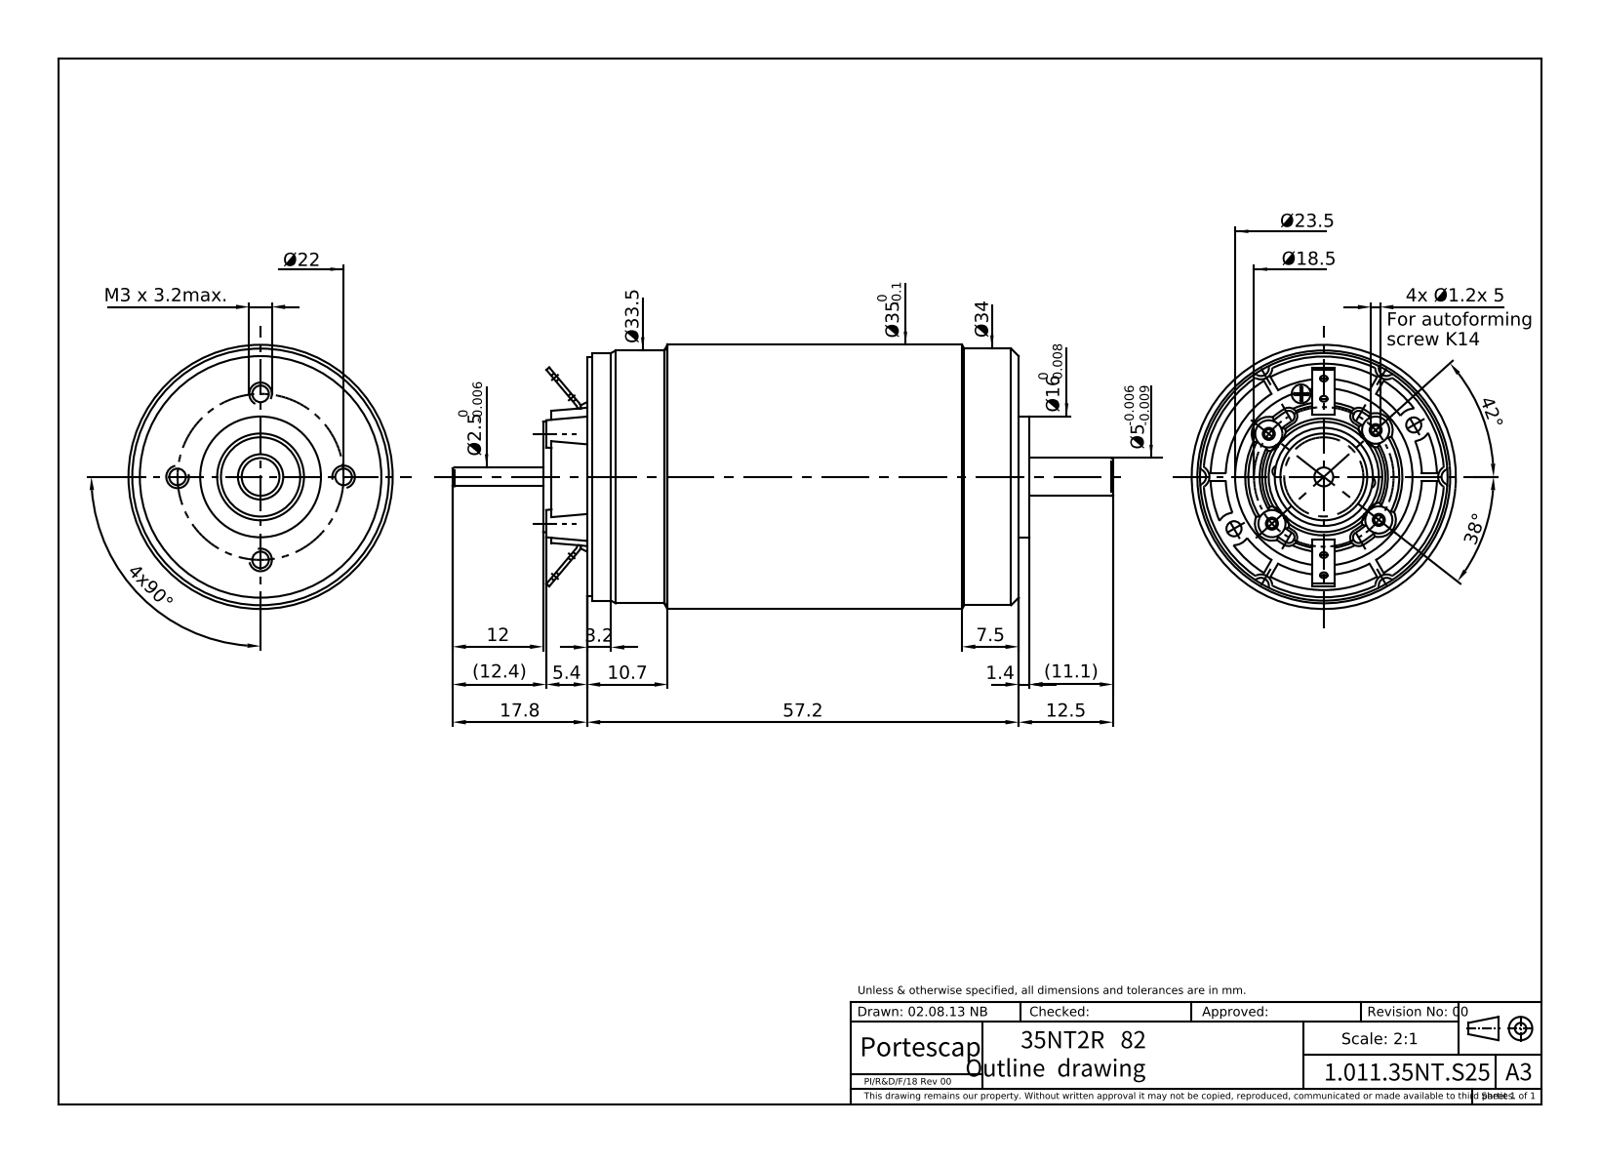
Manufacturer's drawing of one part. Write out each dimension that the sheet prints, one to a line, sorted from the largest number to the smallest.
4x90°
57.2
42°
38°
17.8
12.5
(12.4)
12
(11.1)
10.7
7.5
5.4
3.2
M3 x 3.2max.
1.4
4x Ø1.2x 5
